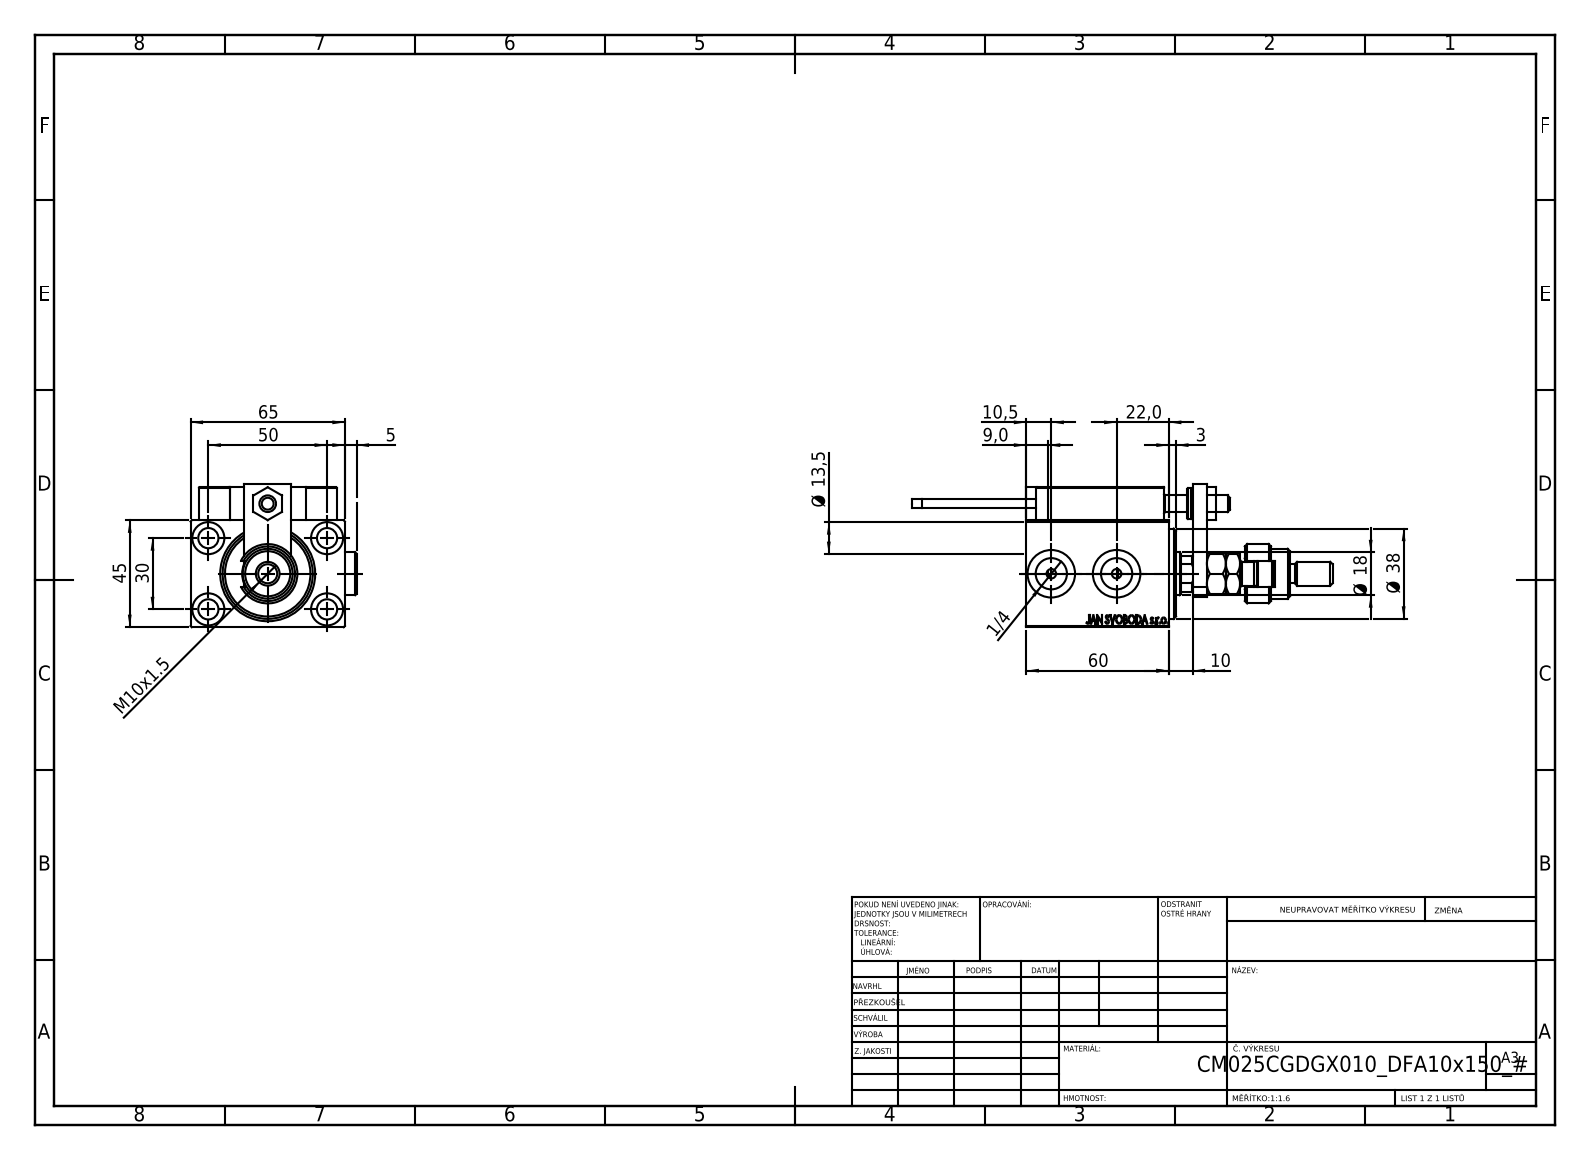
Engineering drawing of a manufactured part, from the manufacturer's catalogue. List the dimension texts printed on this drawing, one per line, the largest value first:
65
60
50
45
Ø 38
30
22,0
Ø 18
Ø 13,5
10,5
M10x1.5
10
9,0
5
3
1/4
